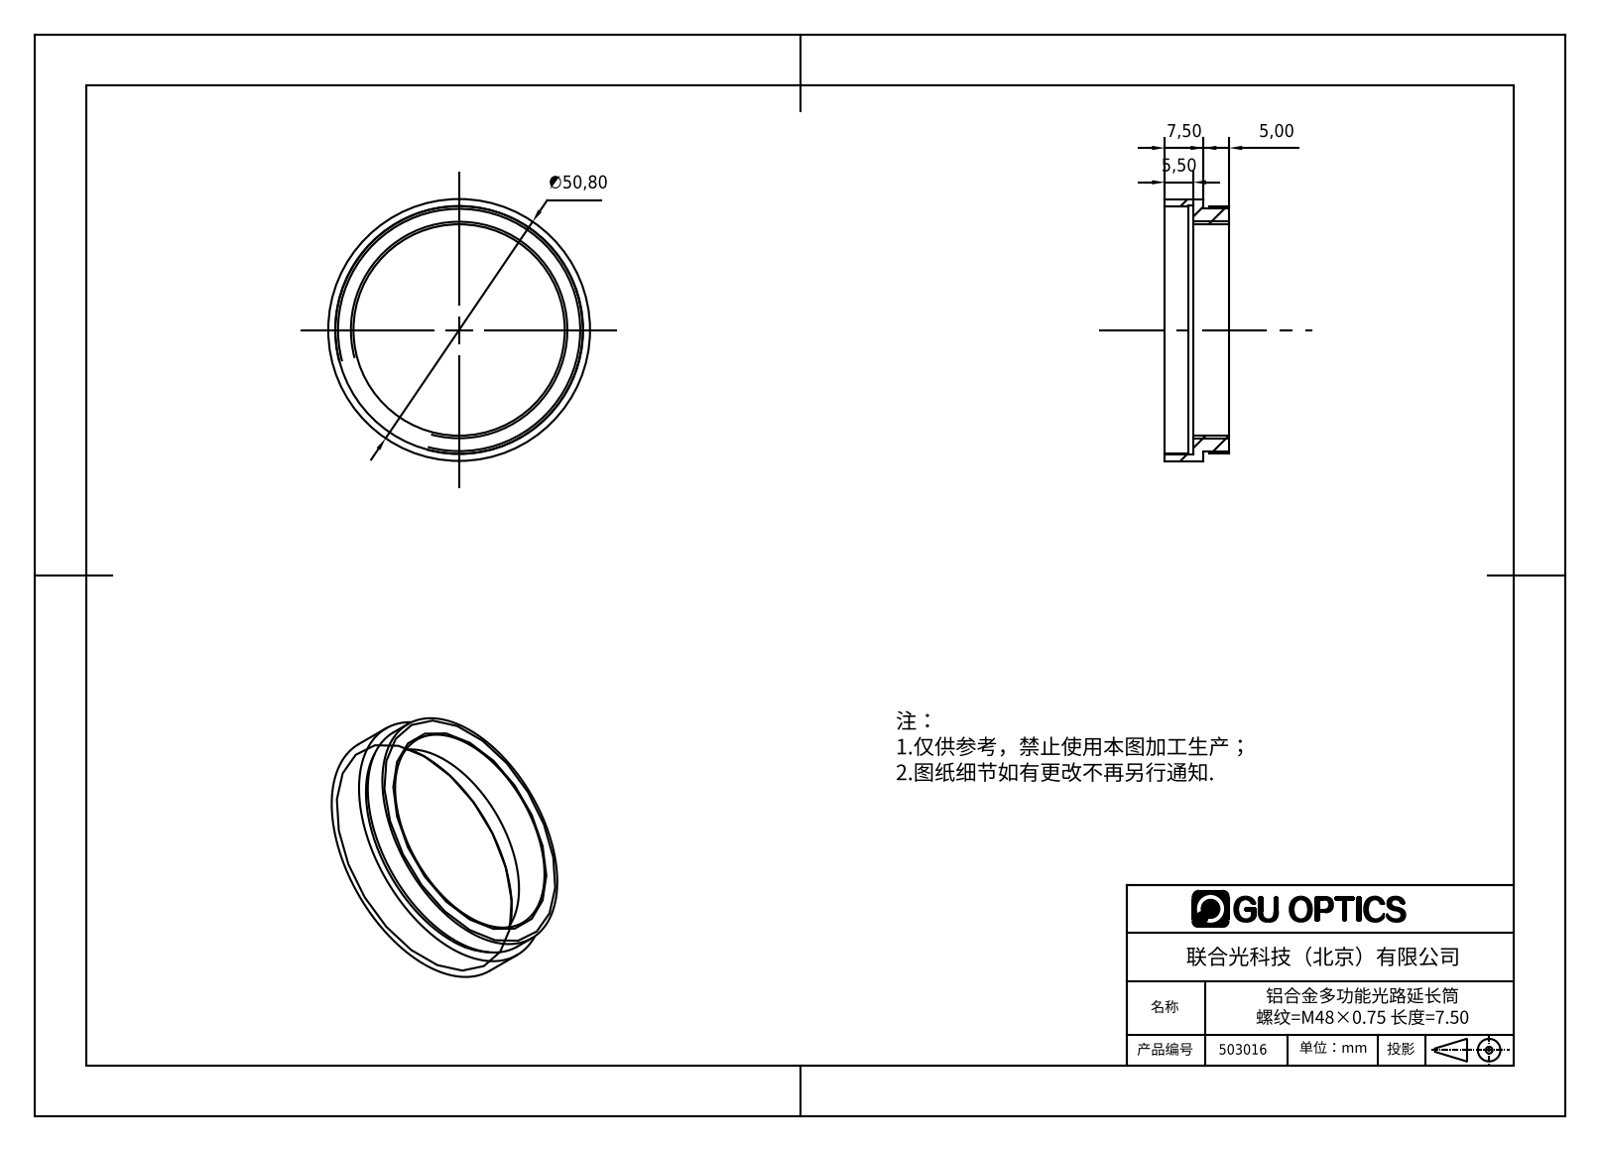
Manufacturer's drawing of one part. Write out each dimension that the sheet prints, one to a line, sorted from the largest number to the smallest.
∅50,80
7,50
5,50
5,00
